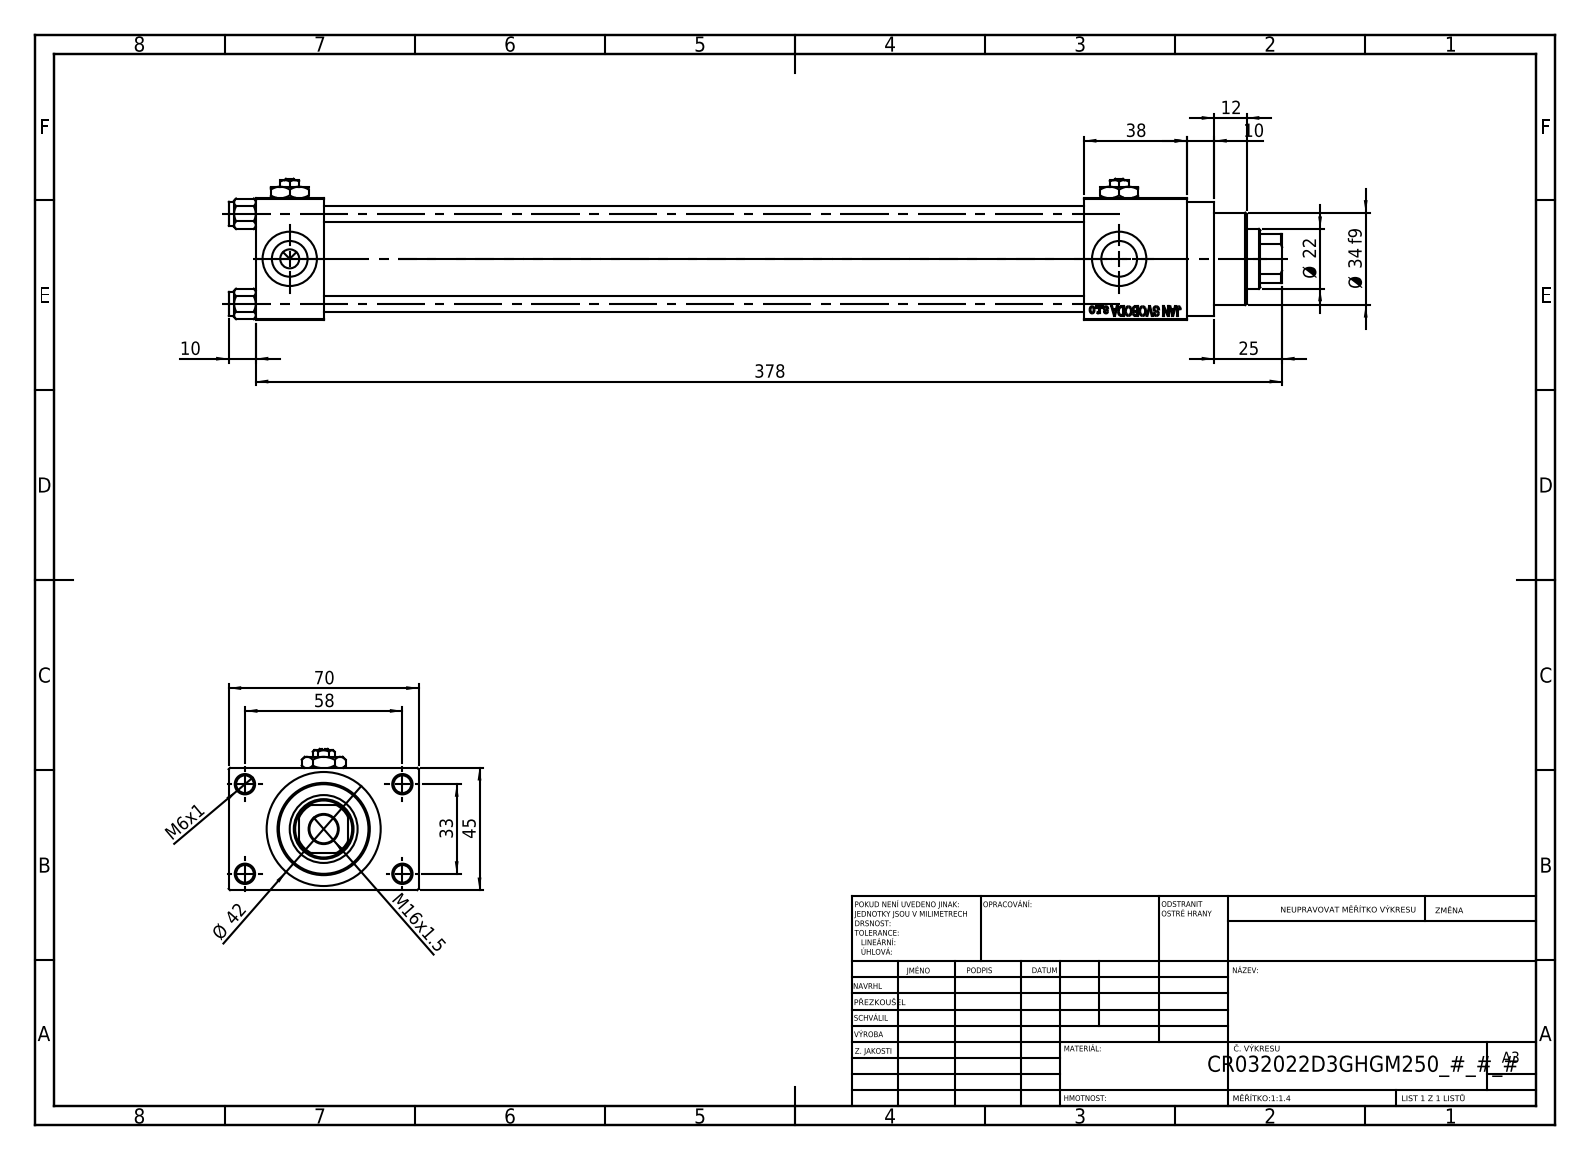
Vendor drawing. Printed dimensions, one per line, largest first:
378
70
58
45
Ø 42
38
Ø 34 f9
33
25
Ø 22
M16x1.5
12
10
10
M6x1
